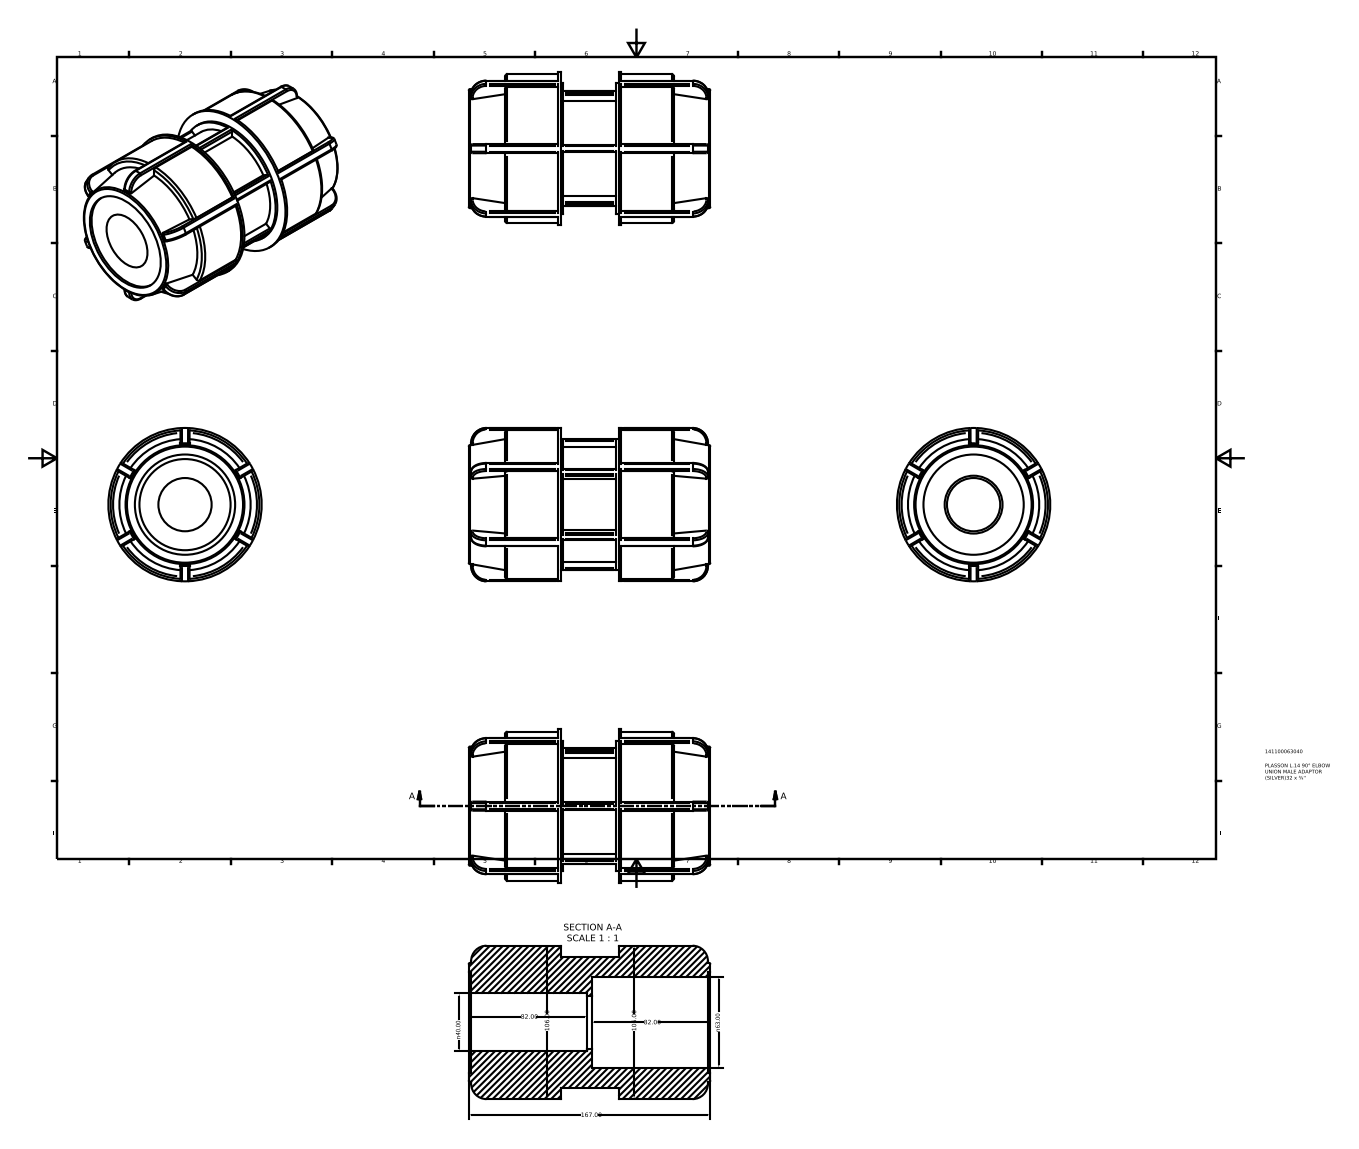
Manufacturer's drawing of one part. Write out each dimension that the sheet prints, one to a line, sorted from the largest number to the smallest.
167.00
106.00
106.00
82.00
82.00
n63.00
n40.00
